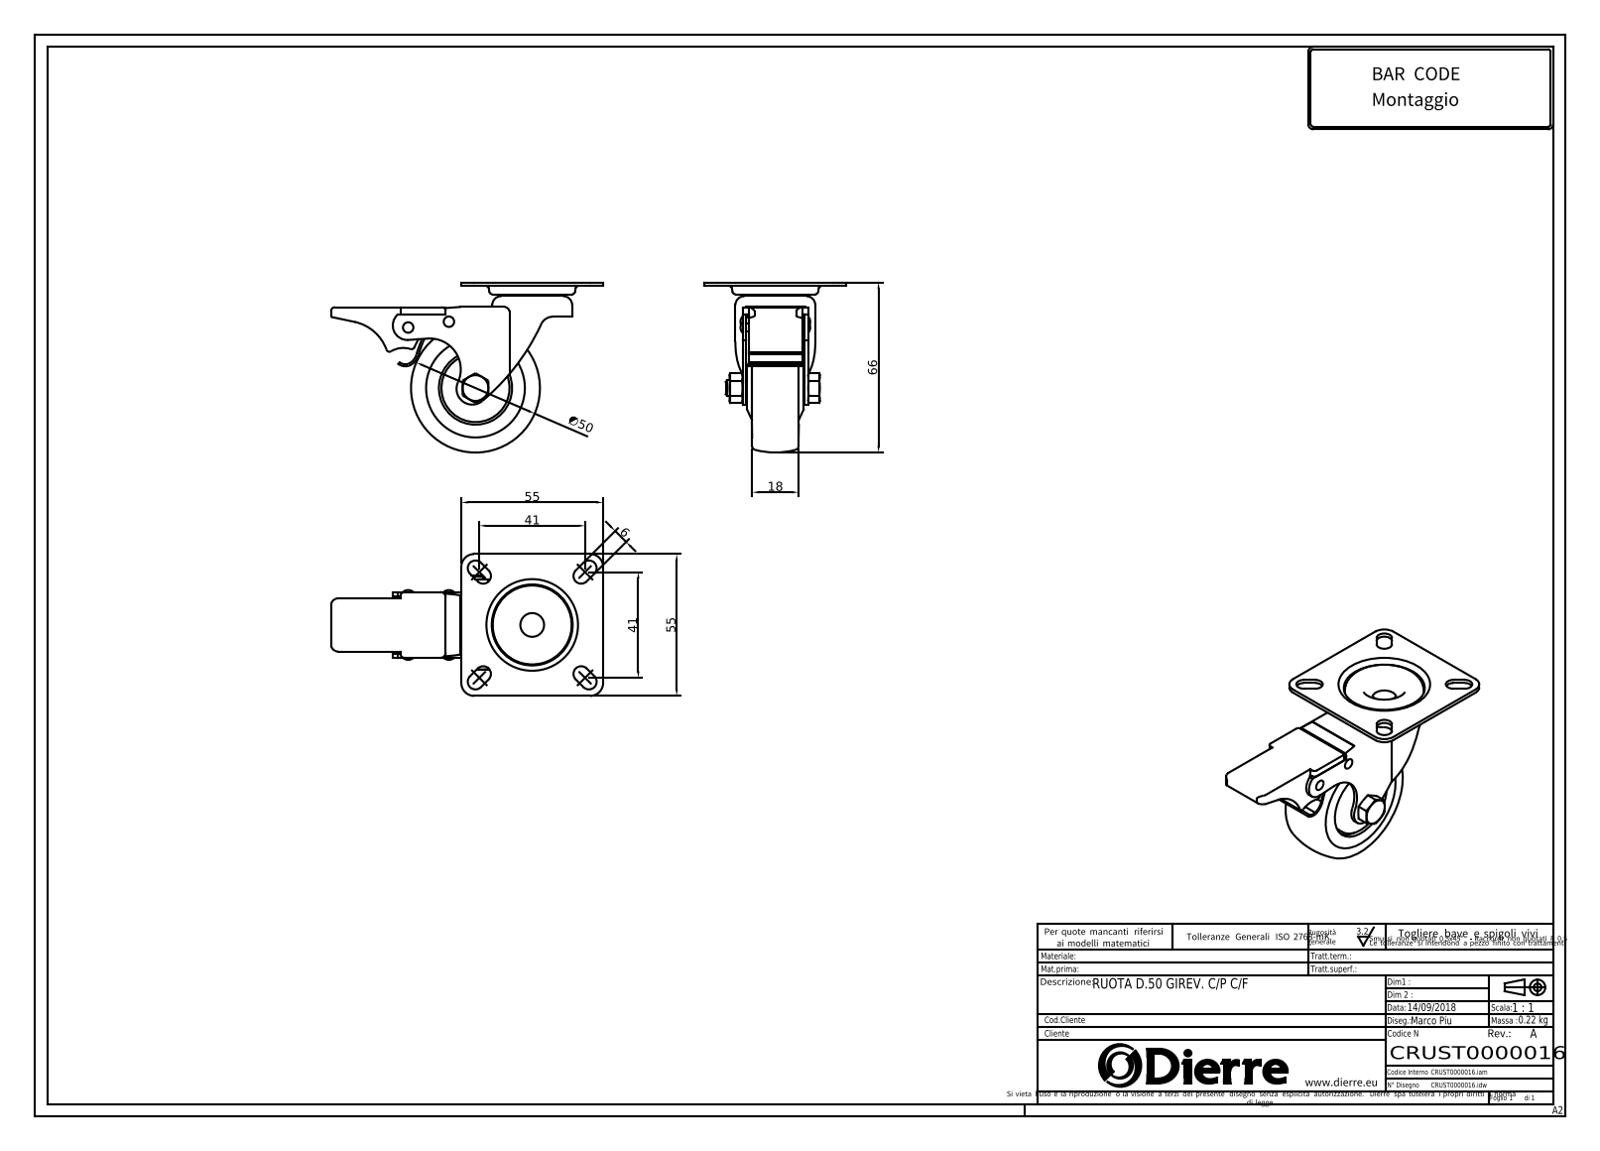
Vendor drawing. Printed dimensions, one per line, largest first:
66
55
55
∅50
41
41
18
6
